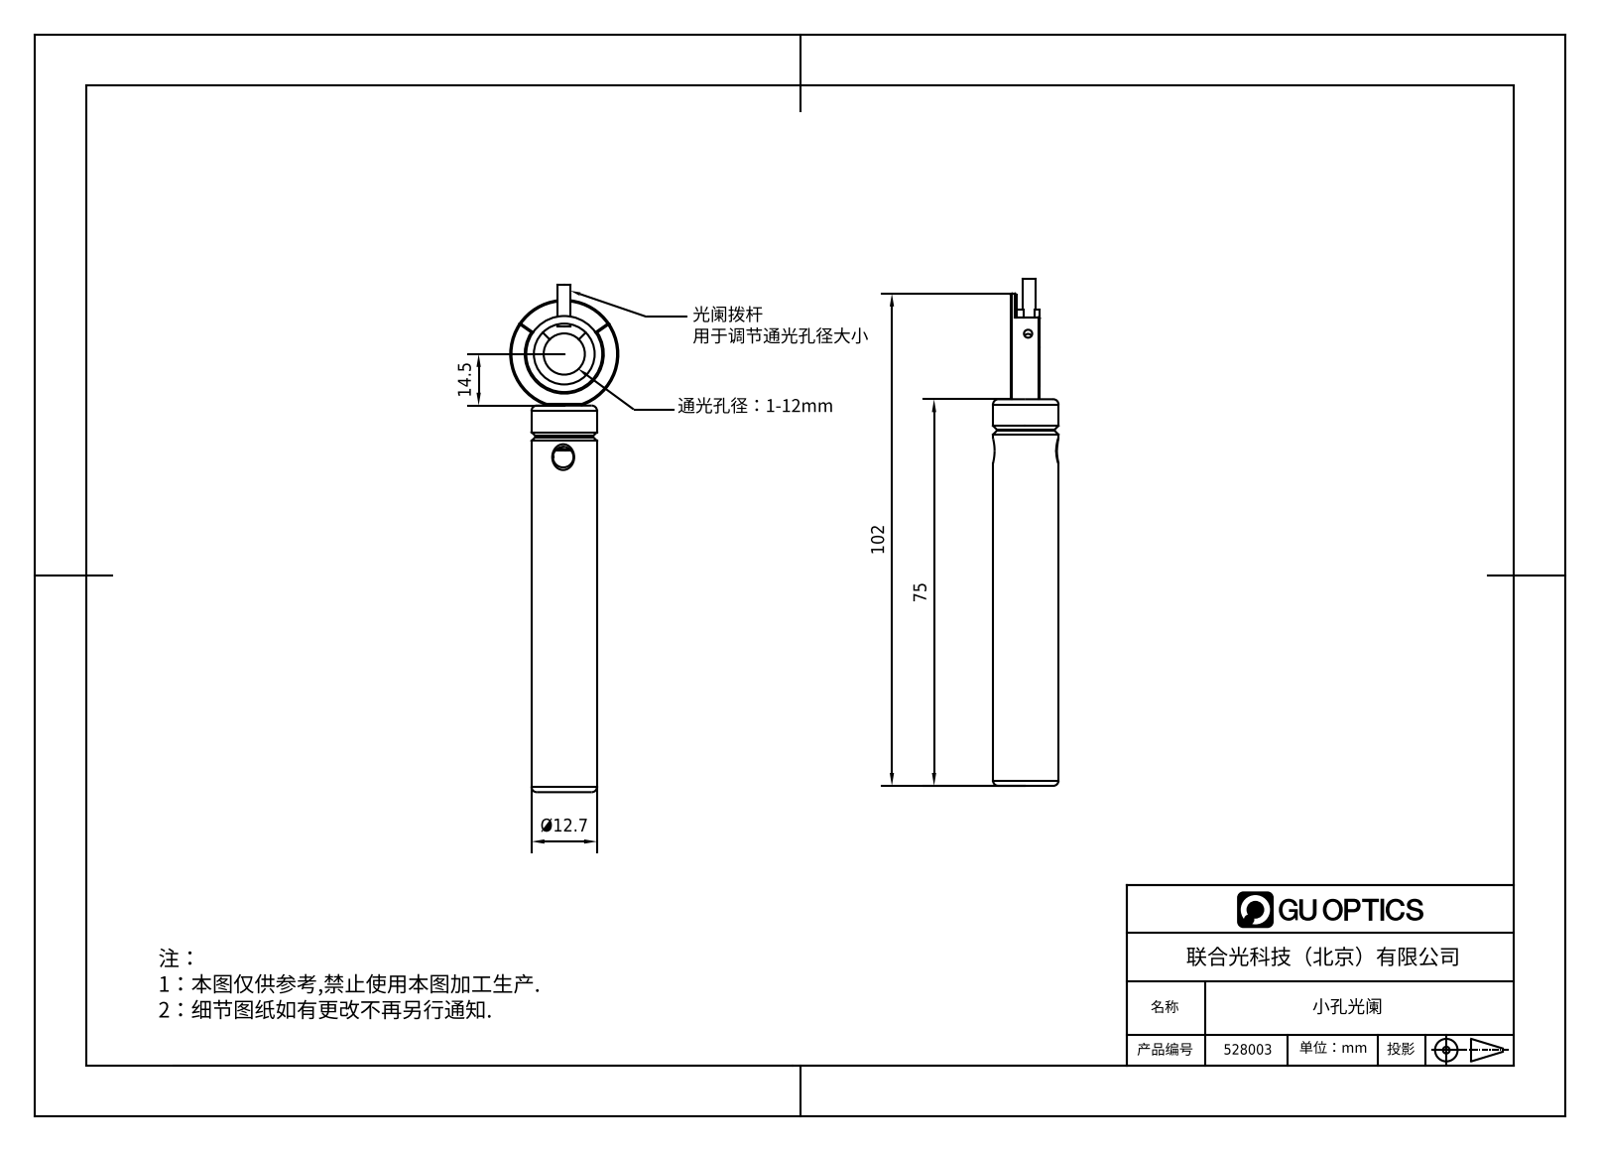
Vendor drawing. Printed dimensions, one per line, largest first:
102
75
14.5
Ø12.7
